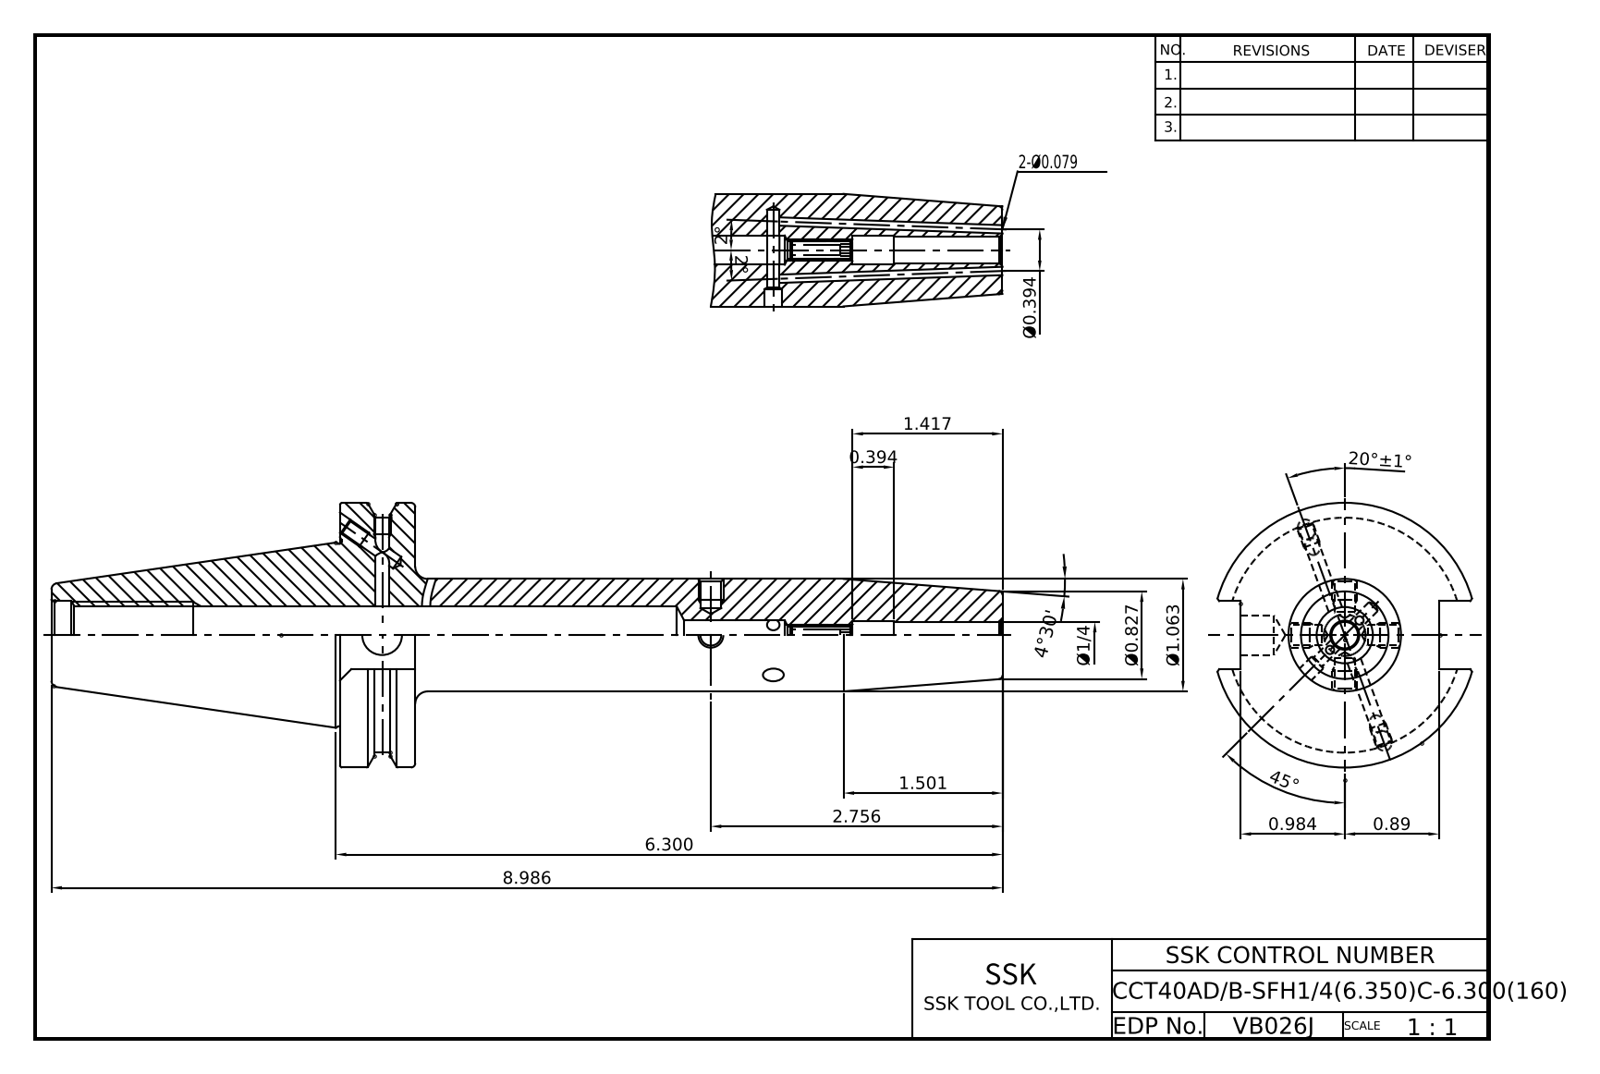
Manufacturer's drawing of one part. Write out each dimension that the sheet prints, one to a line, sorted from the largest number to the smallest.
45°
20°±1°
8.986
6.300
4°30'
2.756
2°
2°
1.501
1.417
Ø1.063
0.984
0.89
Ø0.827
0.394
Ø0.394
